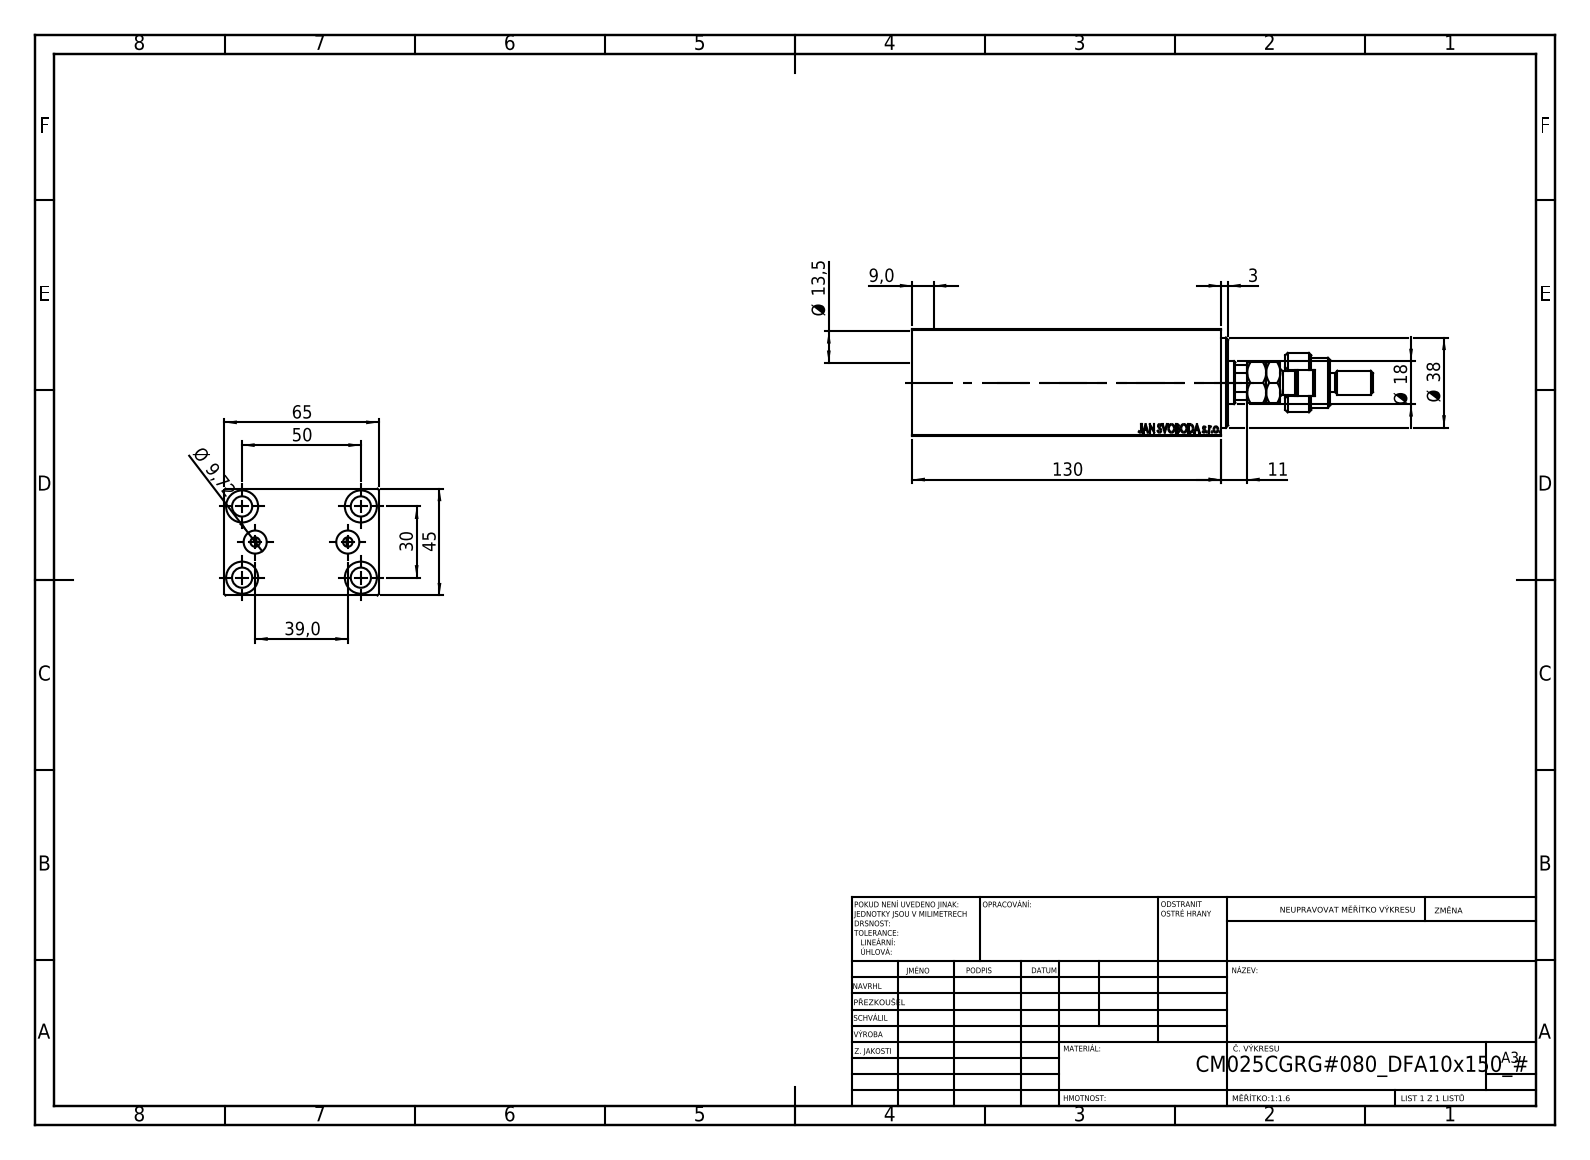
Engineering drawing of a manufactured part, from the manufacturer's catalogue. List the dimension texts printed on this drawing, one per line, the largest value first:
130
65
50
45
39,0
Ø 38
30
Ø 18
Ø 13,5
11
Ø 9,72
9,0
3
